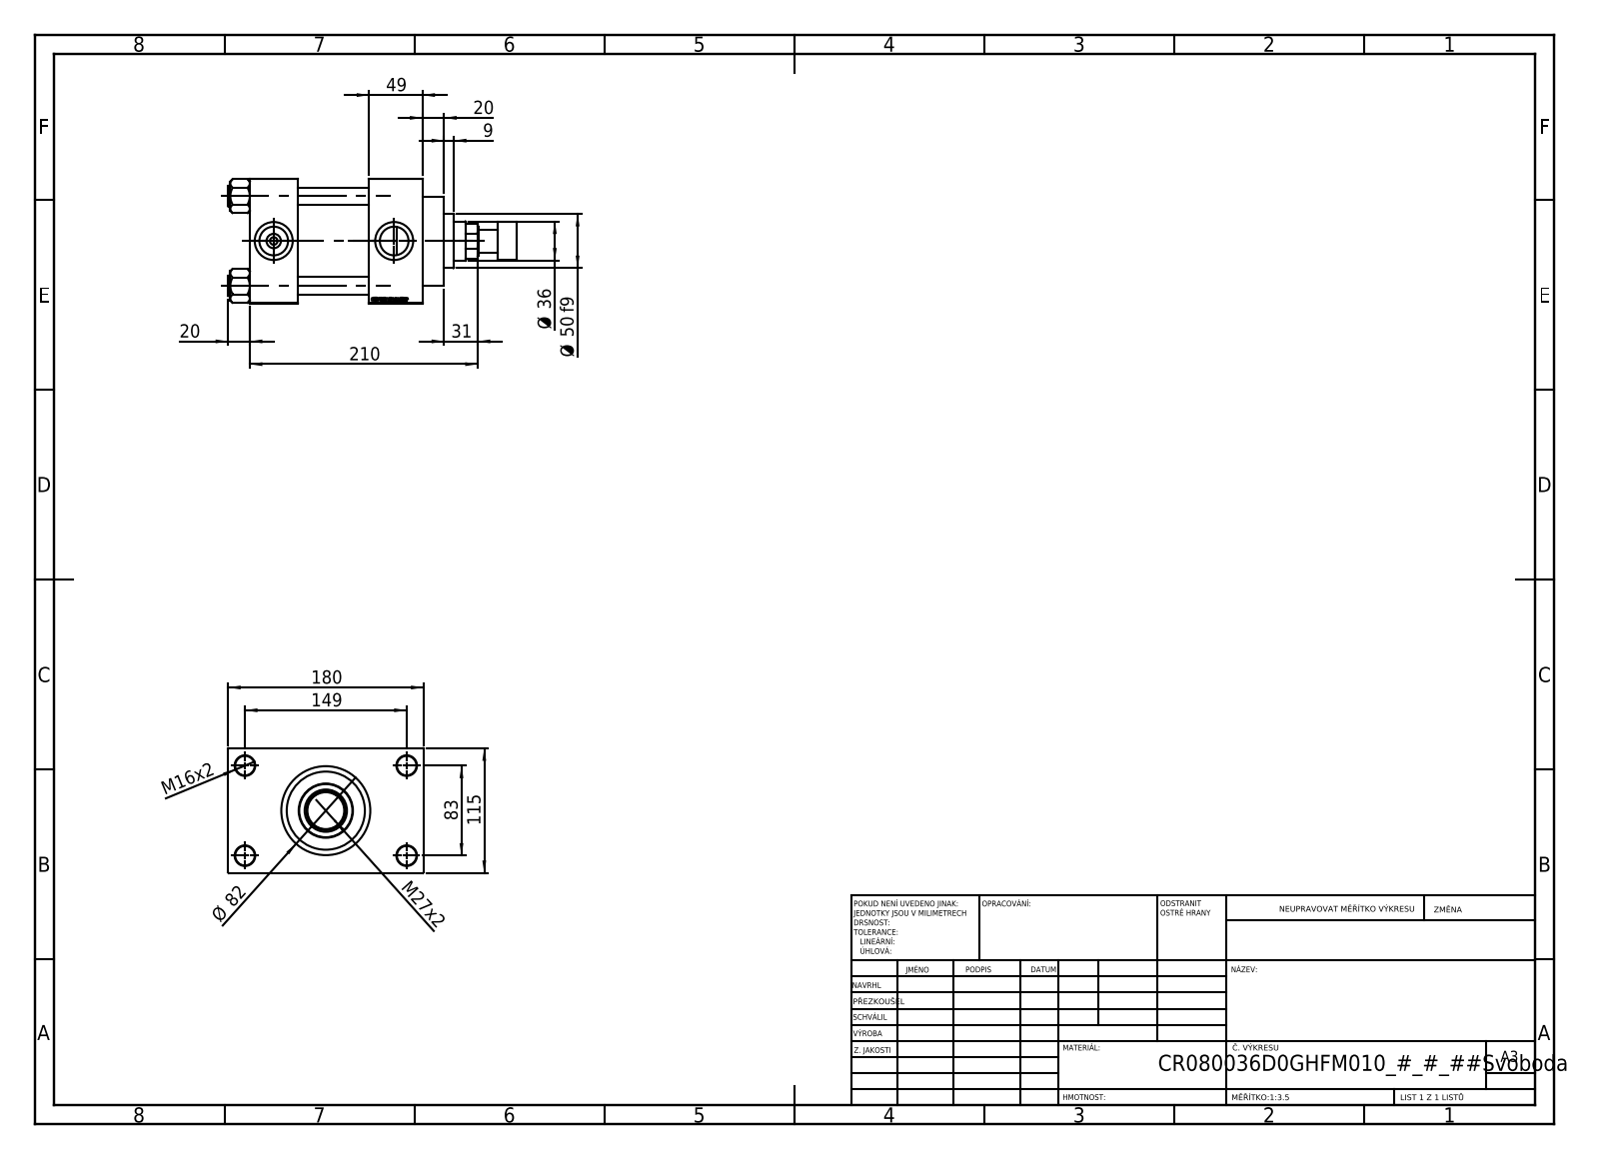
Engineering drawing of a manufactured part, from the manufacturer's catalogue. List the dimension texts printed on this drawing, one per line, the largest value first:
210
180
149
115
83
Ø 82
Ø 50 f9
49
Ø 36
31
M27x2
20
20
M16x2
9
